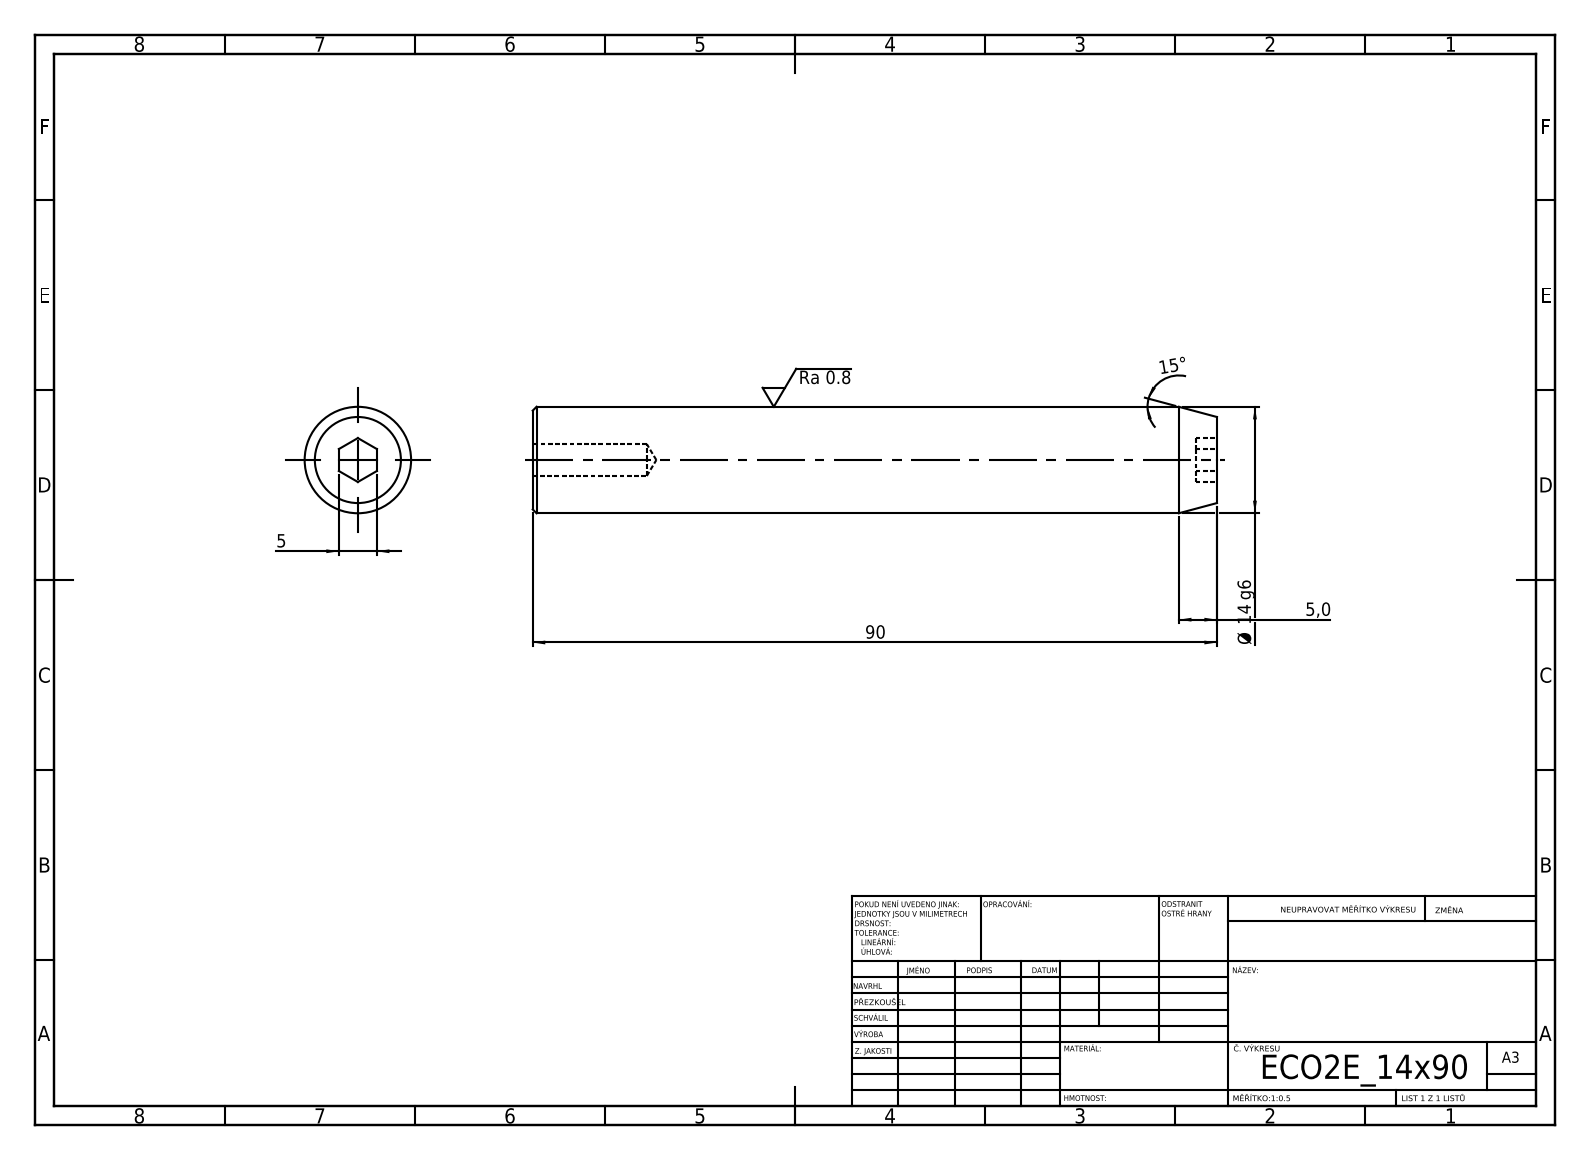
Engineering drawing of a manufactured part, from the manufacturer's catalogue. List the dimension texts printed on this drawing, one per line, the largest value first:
90
15°
Ø 14 g6
5,0
5
